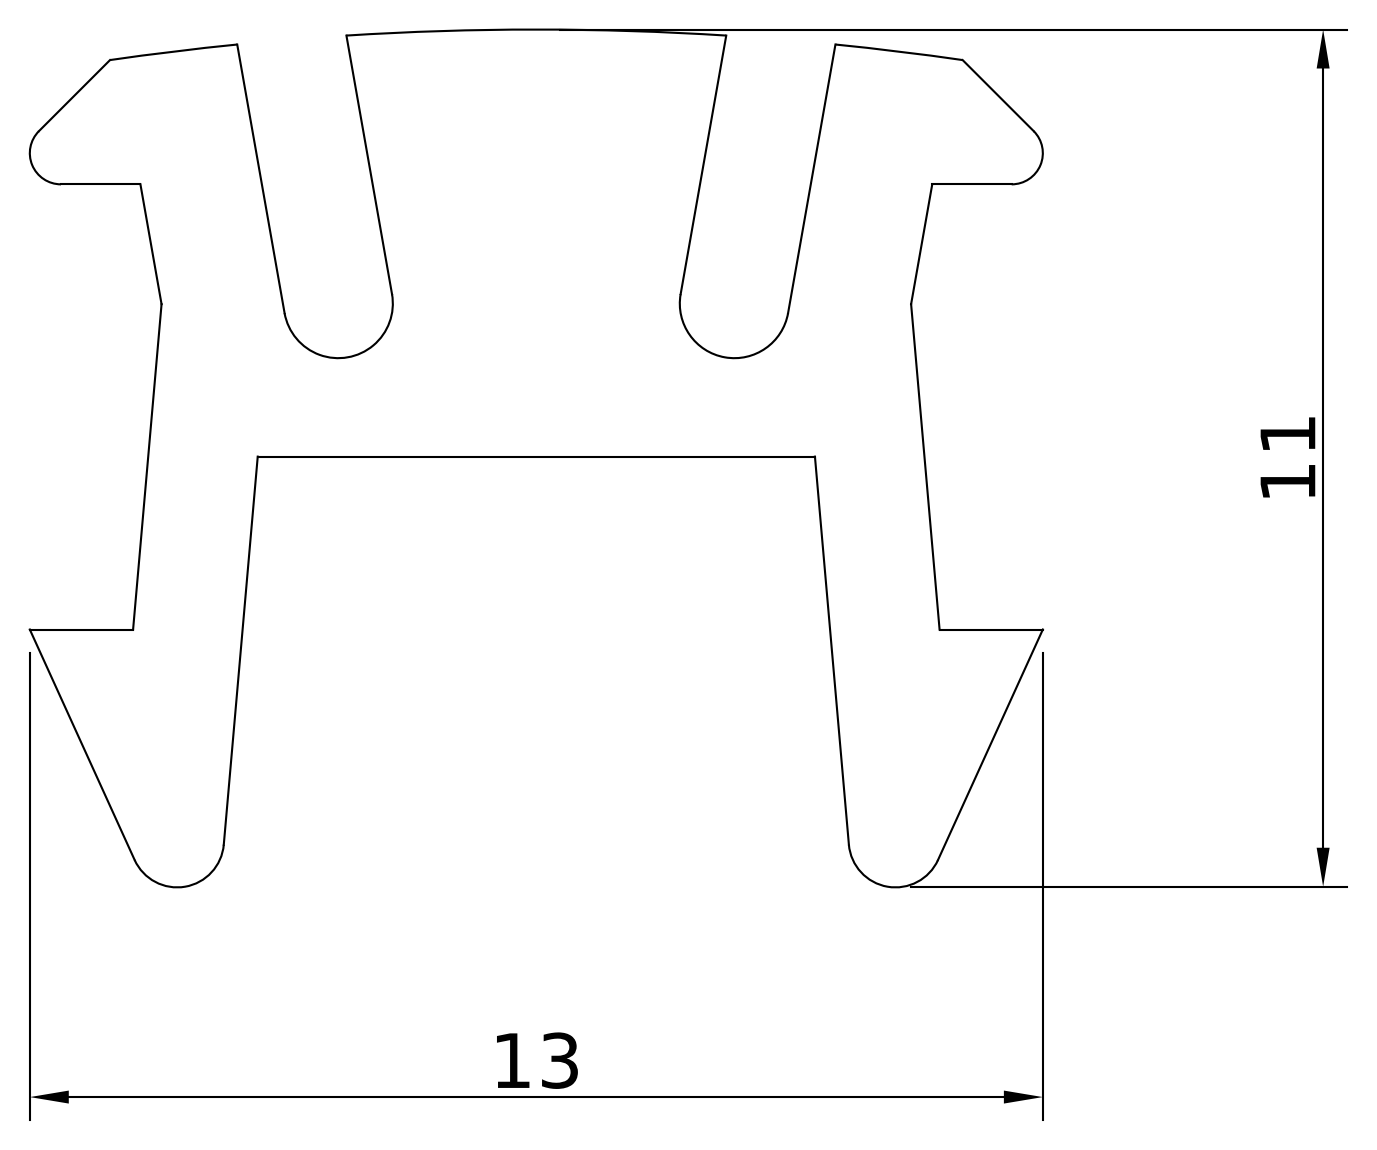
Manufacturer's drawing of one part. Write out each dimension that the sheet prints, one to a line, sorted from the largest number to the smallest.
13
11
